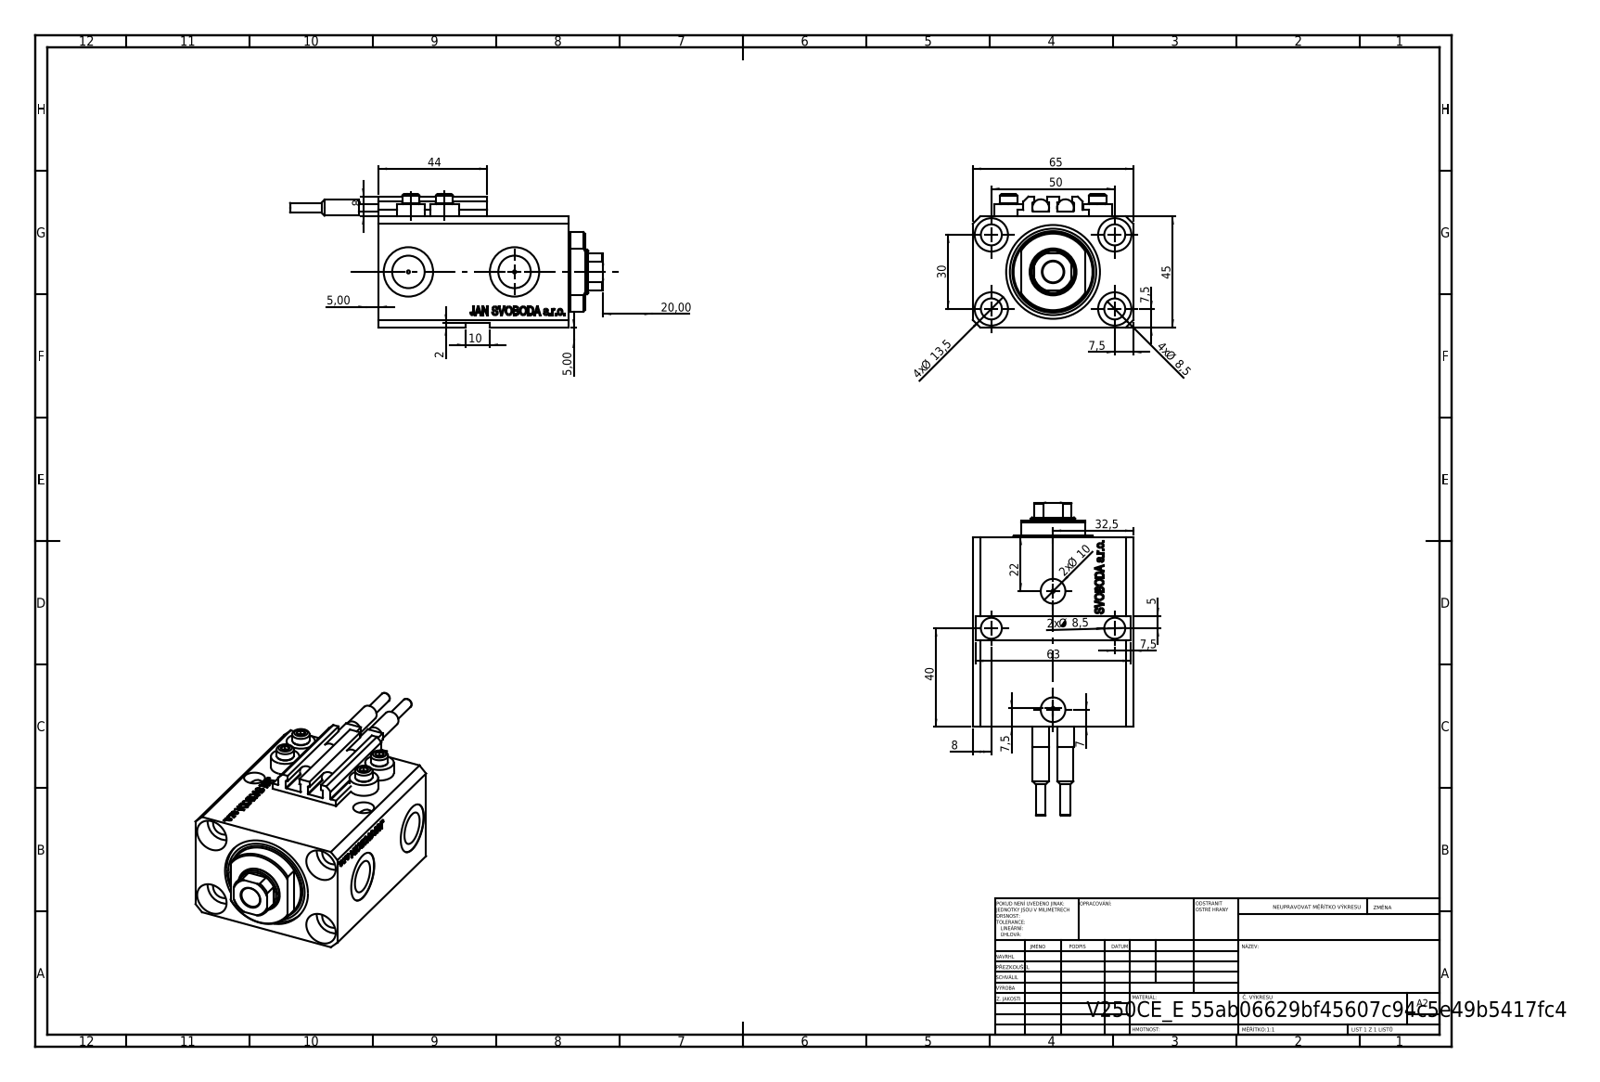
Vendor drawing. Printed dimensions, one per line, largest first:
65
63
50
45
44
40
32,5
30
22
20,00
4x Ø 13,5
10
2x Ø 10
4x Ø 8,5
2x Ø 8,5
8
8
7,5
7,5
7,5
7,5
7
5,00
5,00
5
2
